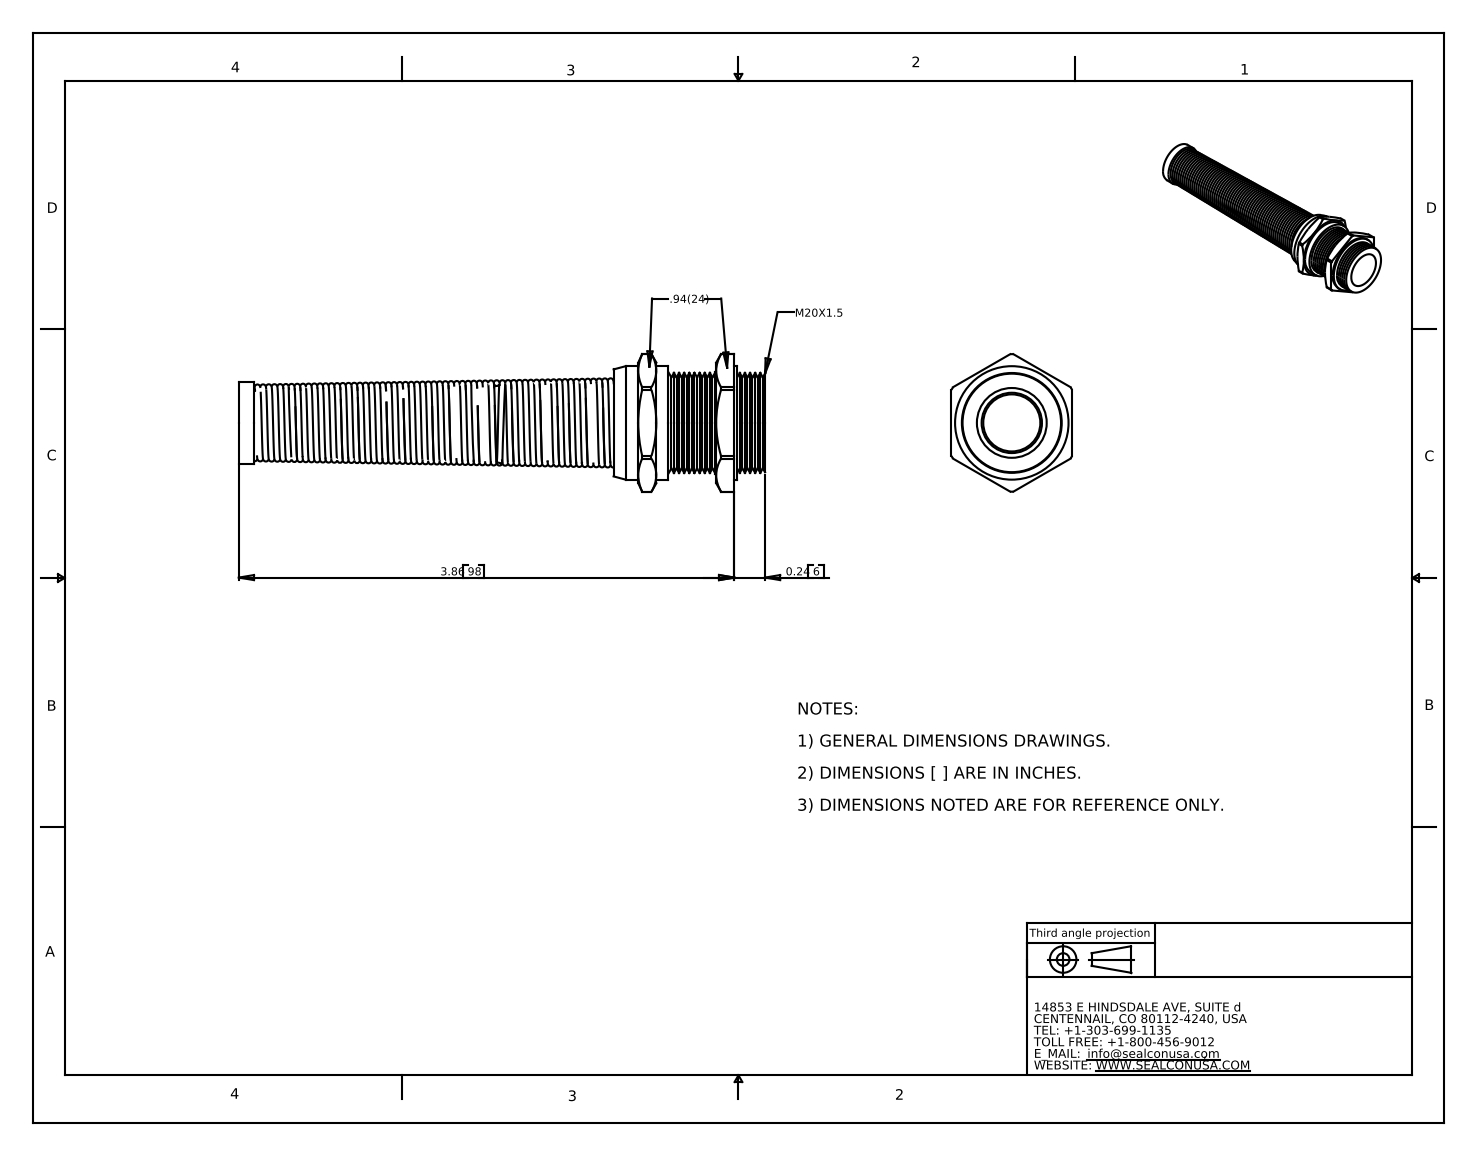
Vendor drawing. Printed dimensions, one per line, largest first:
3.86 98
0.24 6
